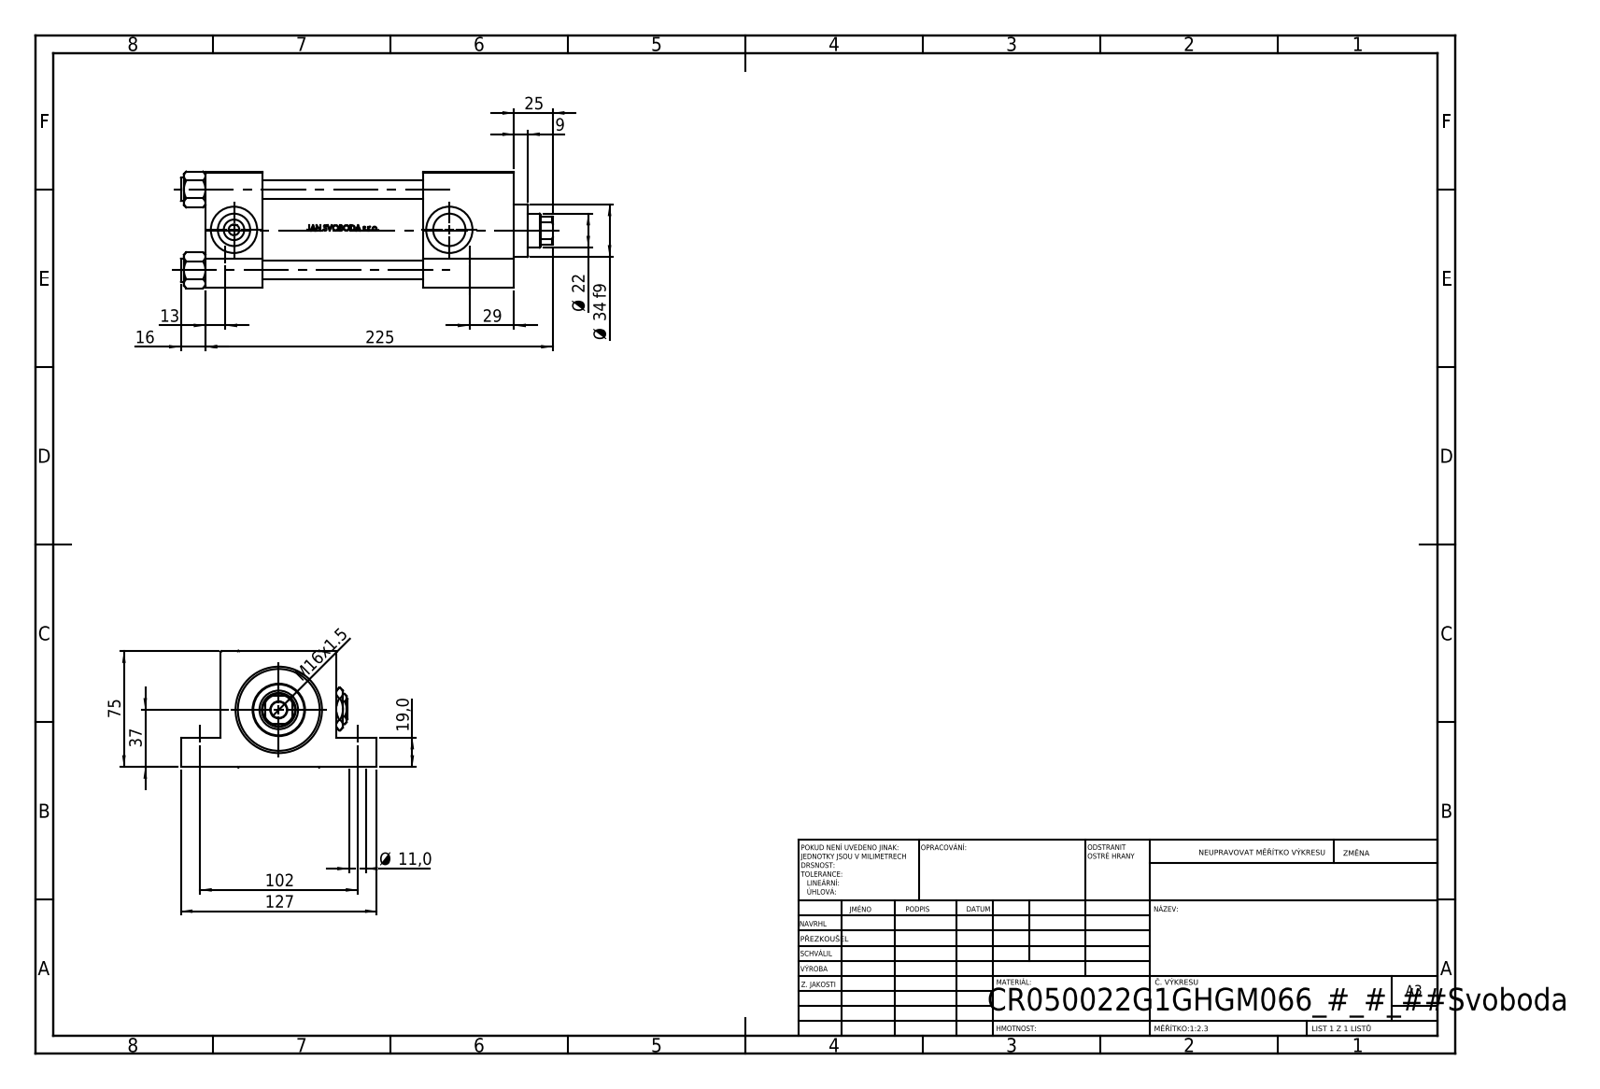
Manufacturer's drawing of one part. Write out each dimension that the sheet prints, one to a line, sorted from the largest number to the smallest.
225
127
102
75
37
Ø 34 f9
29
25
Ø 22
19,0
16
M16x1.5
13
Ø 11,0
9
